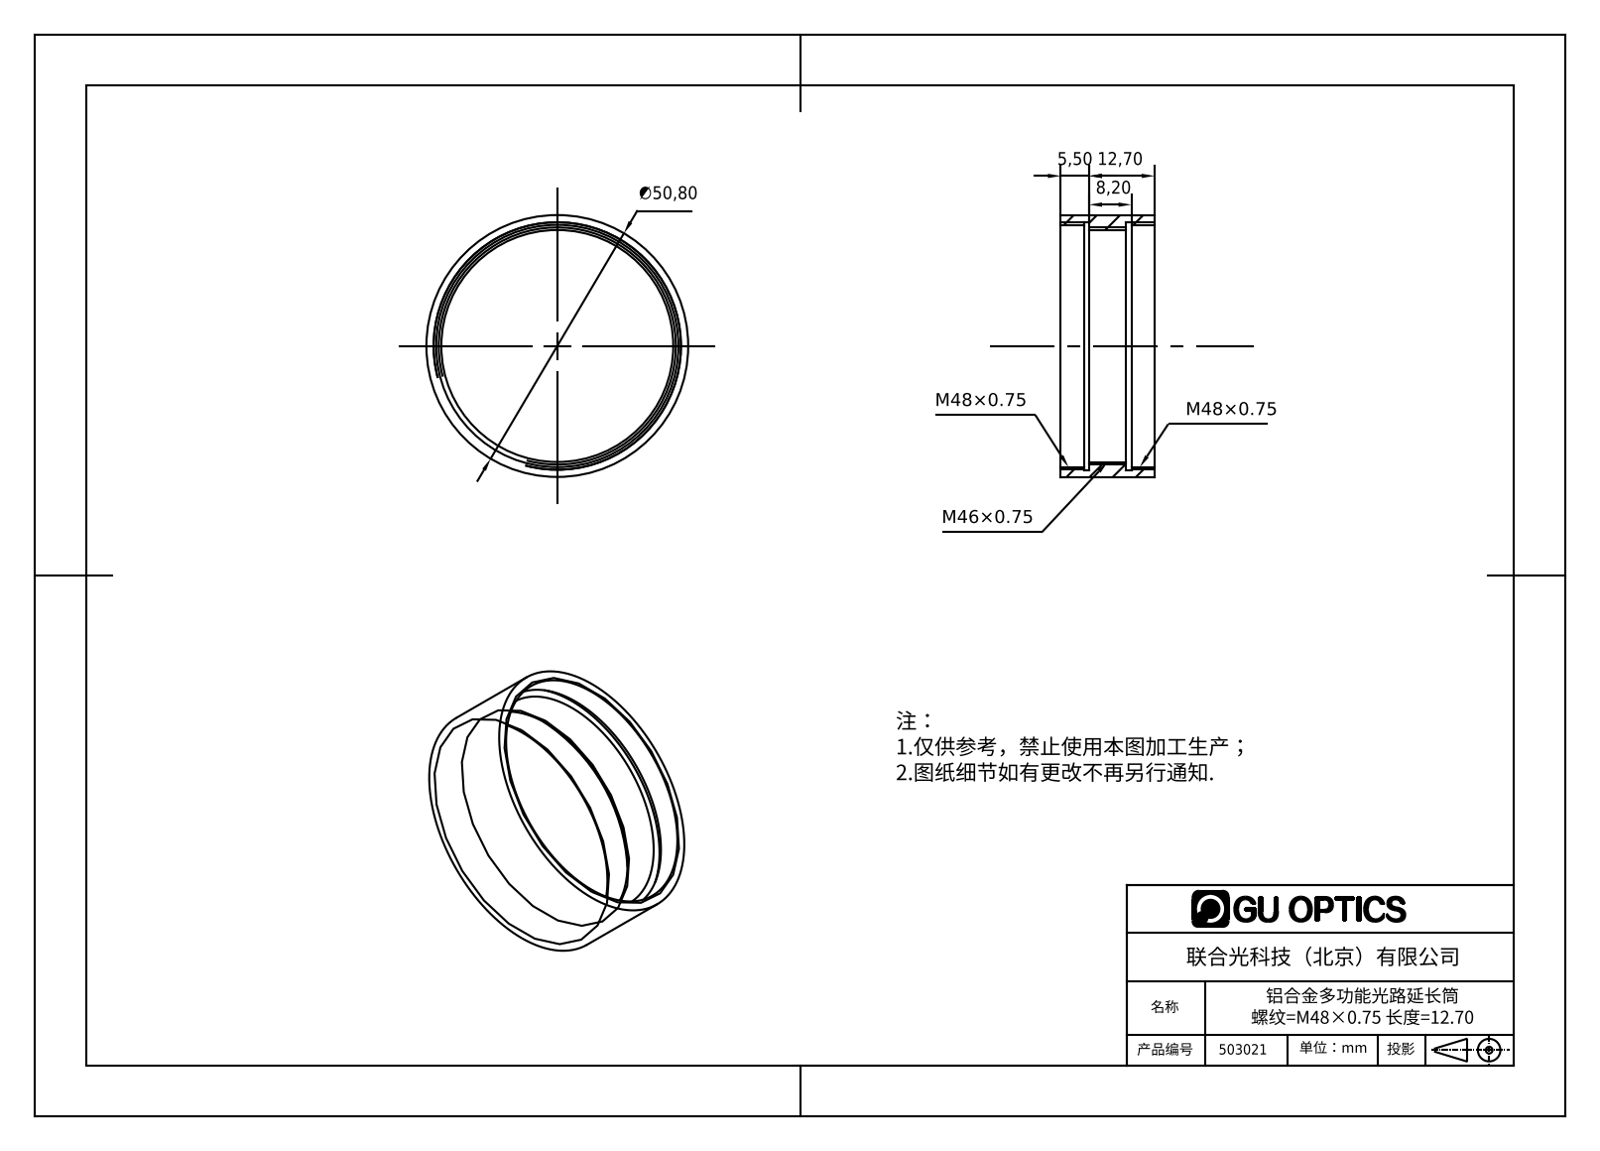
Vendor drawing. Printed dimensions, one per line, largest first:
∅50,80
12,70
8,20
5,50
